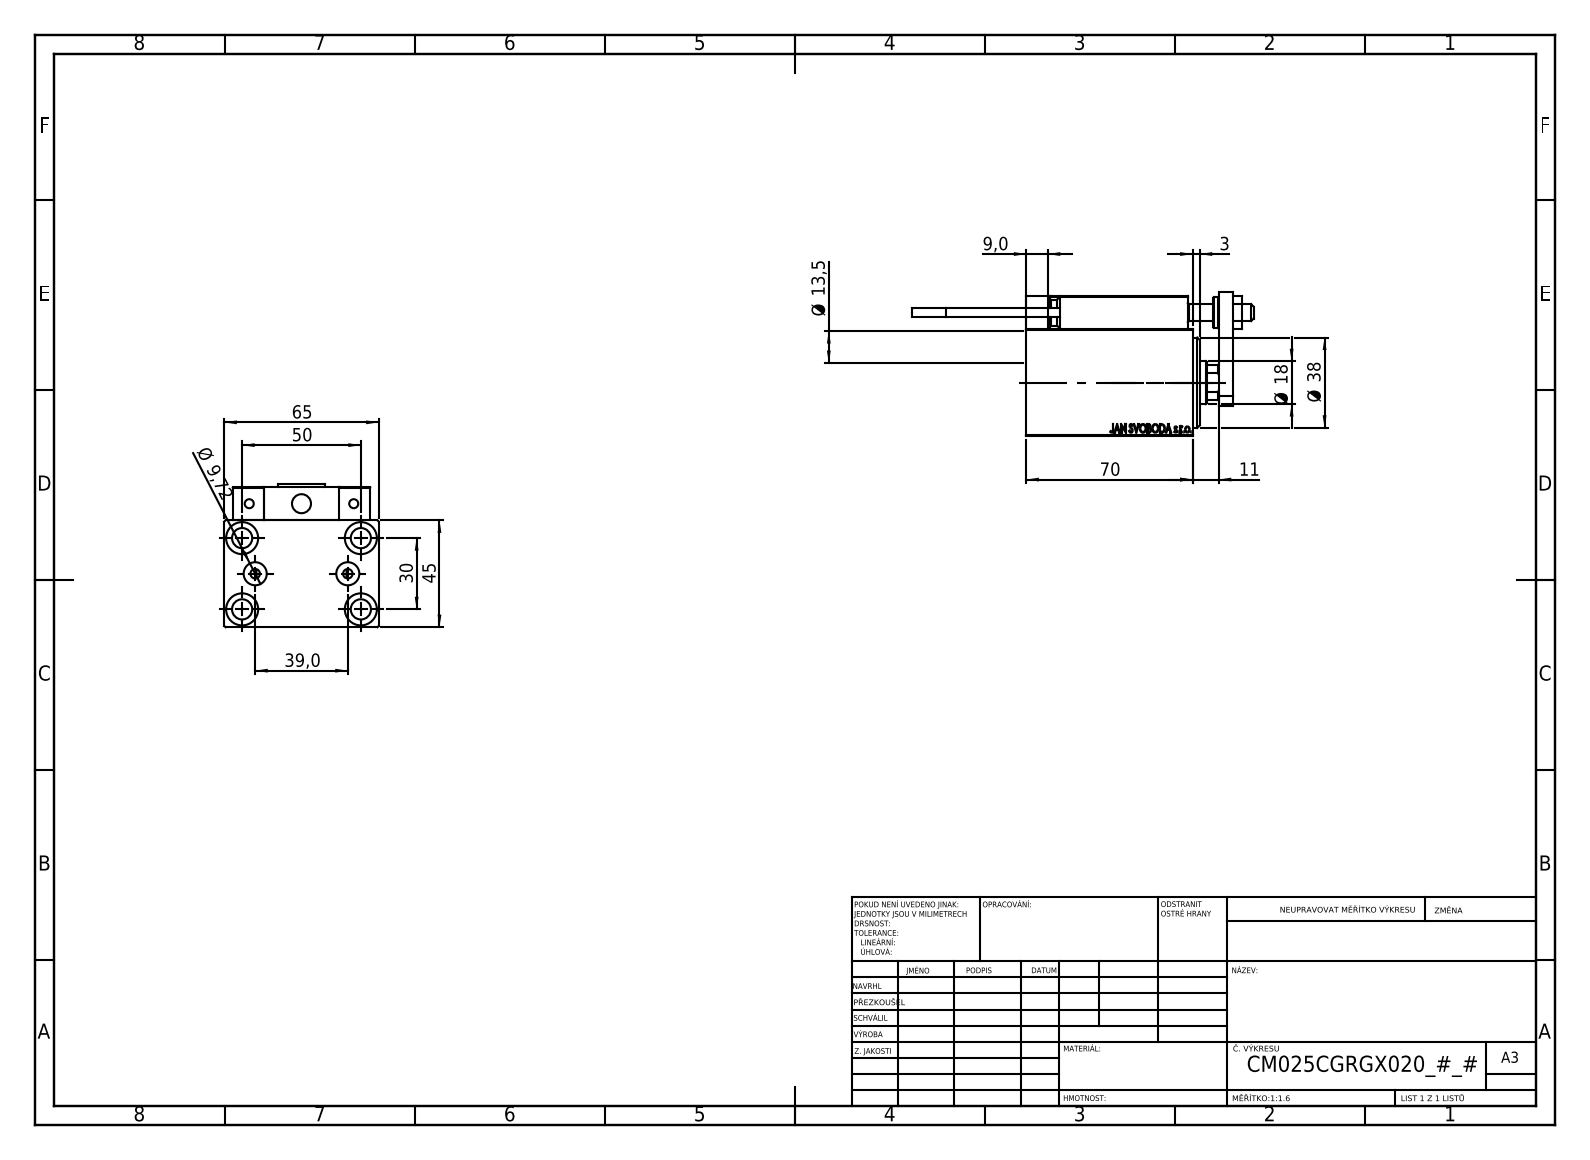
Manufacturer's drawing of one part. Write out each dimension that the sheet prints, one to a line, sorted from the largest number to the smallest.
70
65
50
45
39,0
Ø 38
30
Ø 18
Ø 13,5
11
Ø 9,72
9,0
3
